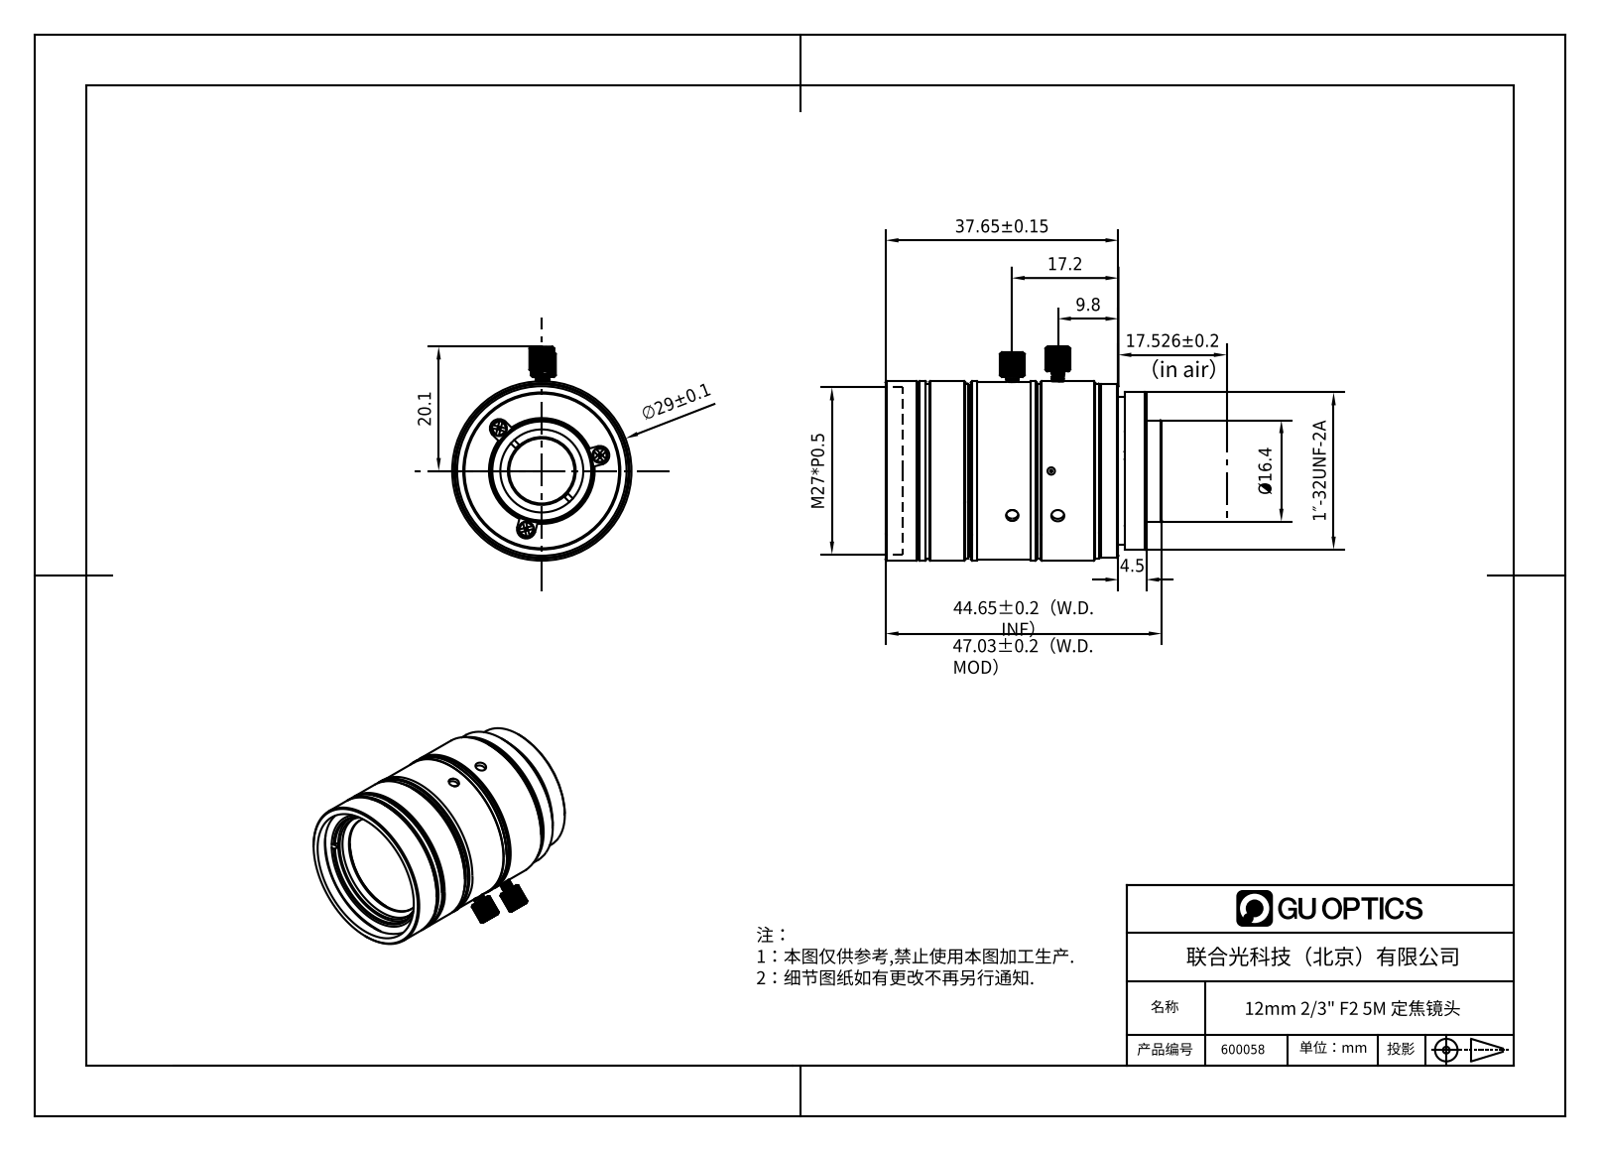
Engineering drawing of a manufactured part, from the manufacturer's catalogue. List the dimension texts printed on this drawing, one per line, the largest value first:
44.65±0.2（W.D. INF）
37.65±0.15
∅29±0.1
M27*P0.5
20.1
17.526±0.2
17.2
Ø16.4
9.8
4.5
1″-32UNF-2A
